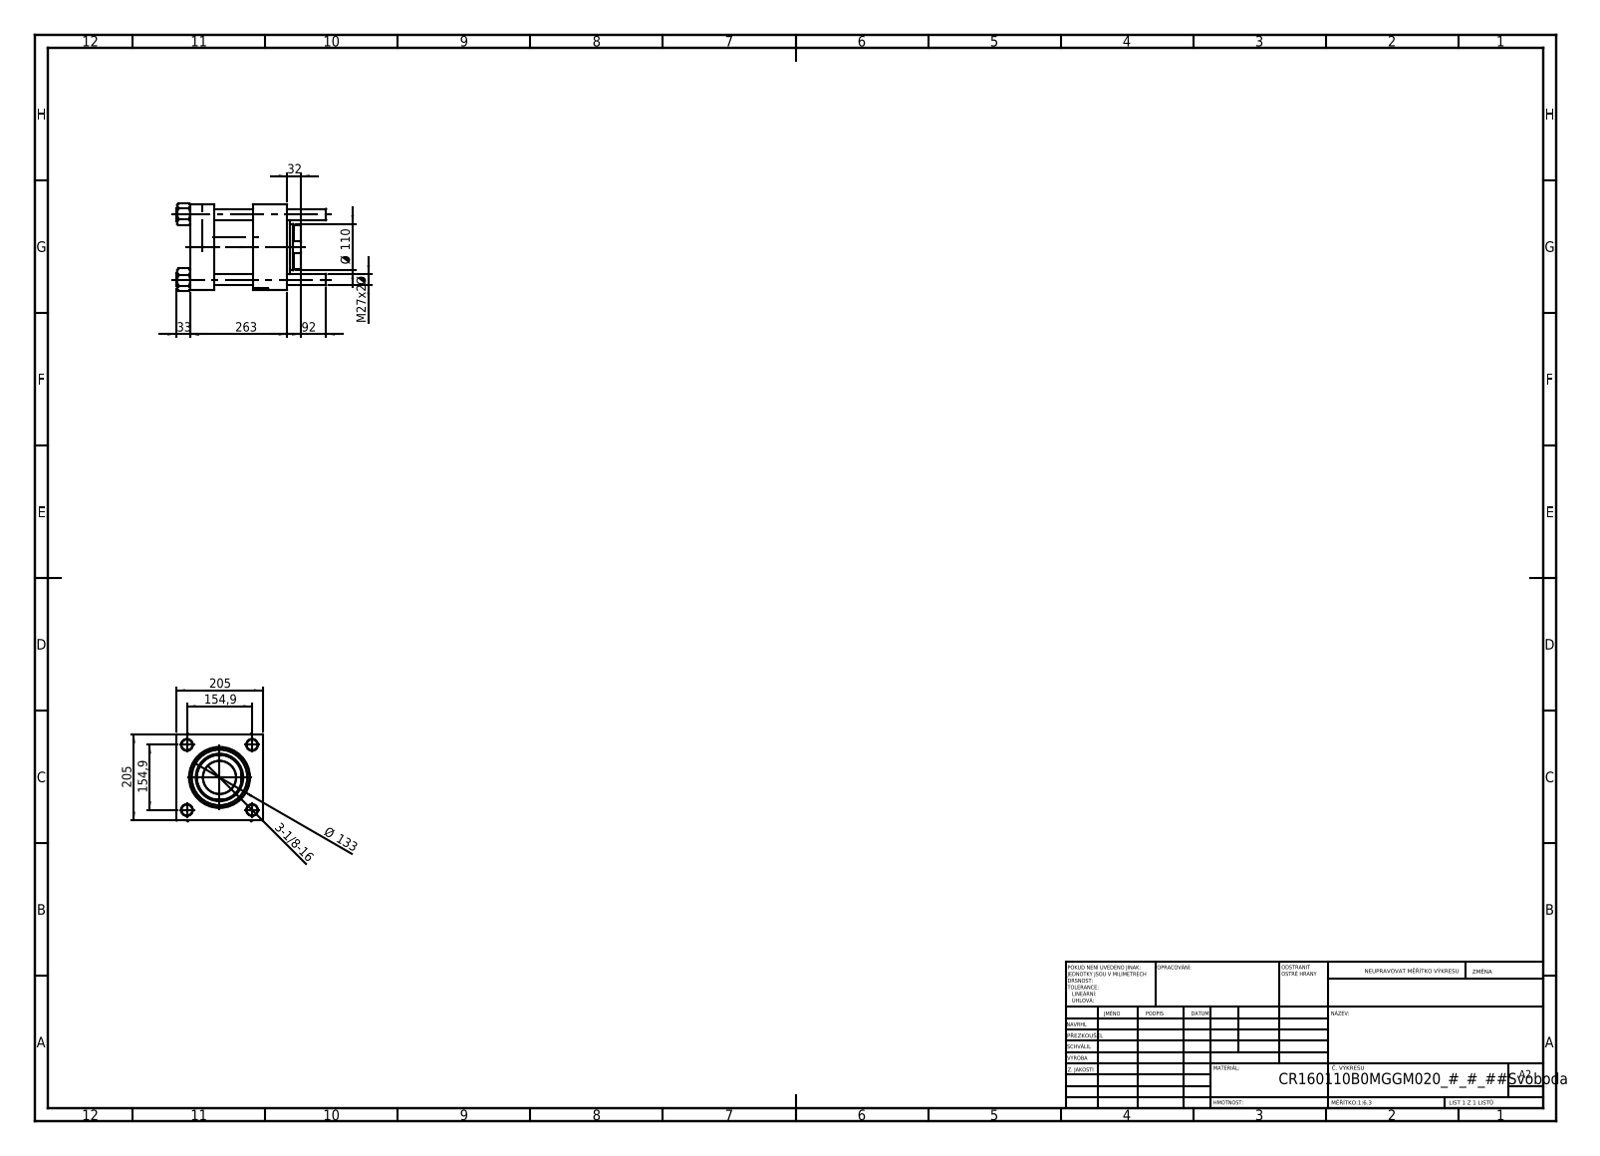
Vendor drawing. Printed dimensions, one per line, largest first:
263
205
205
154,9
154,9
Ø 133
Ø 110
92
33
32
M27x2 Ø
3-1/8-16
